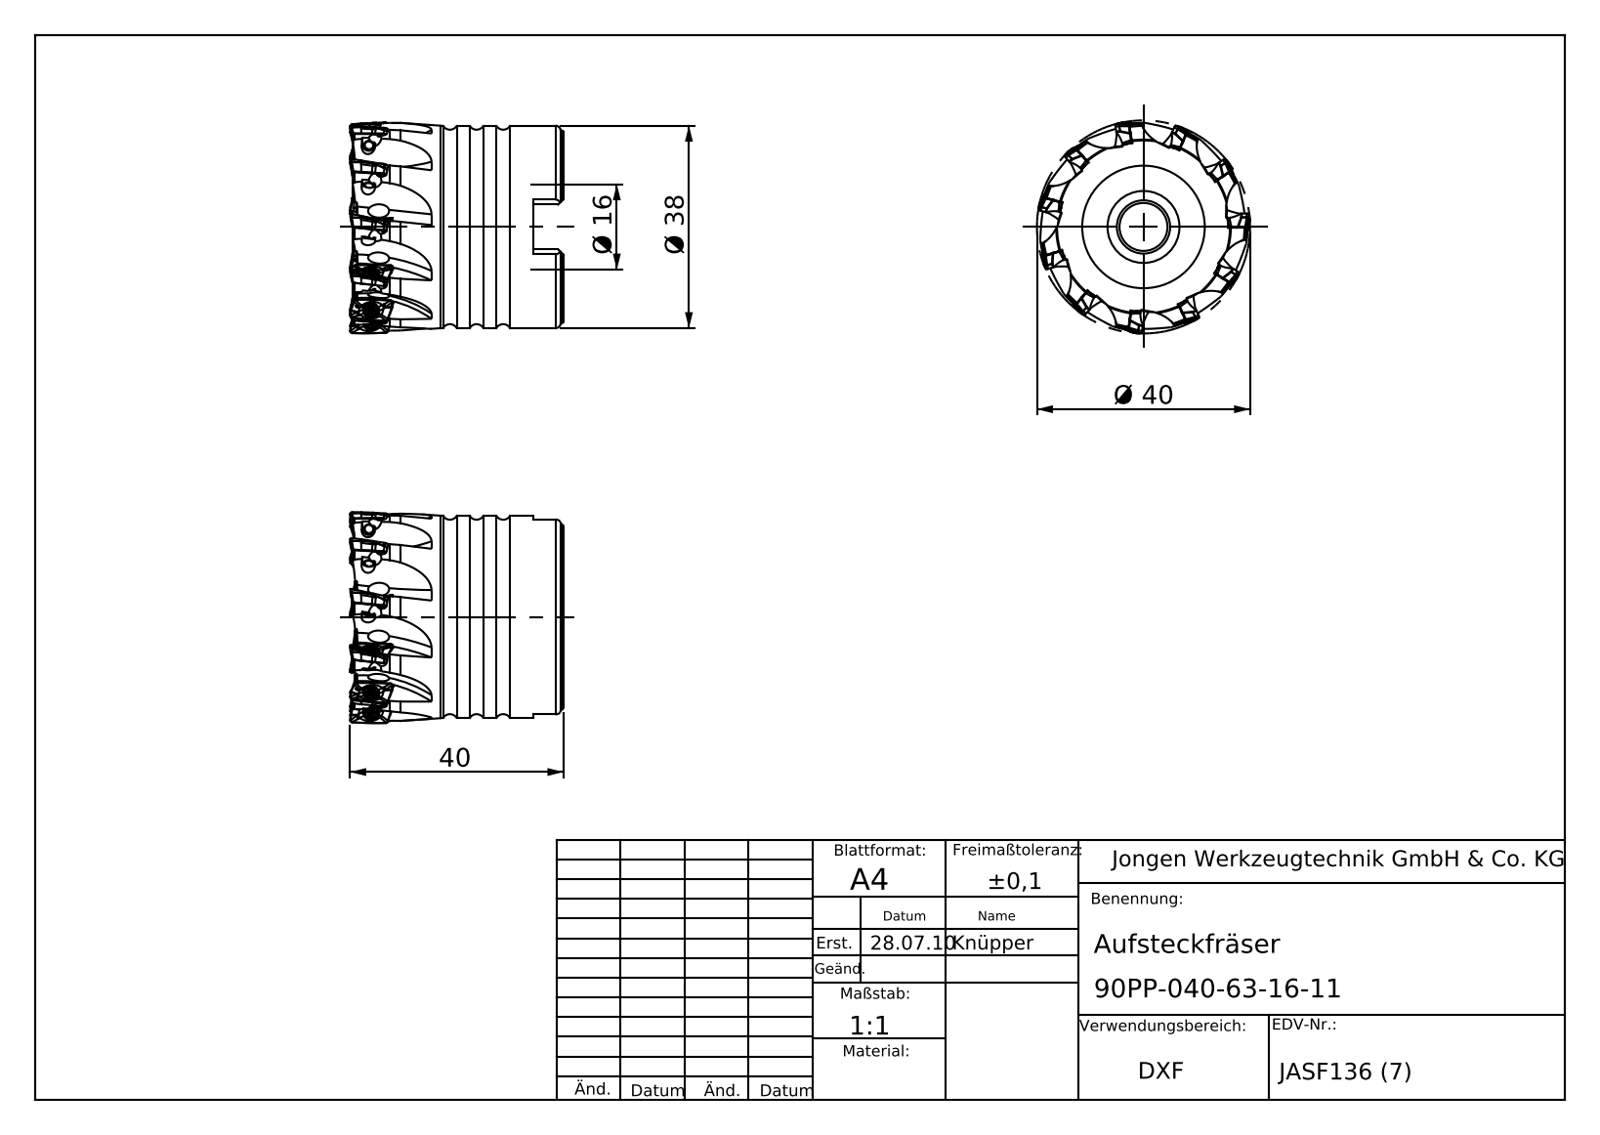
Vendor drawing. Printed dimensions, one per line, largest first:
Ø 40
40
Ø 38
Ø 16
